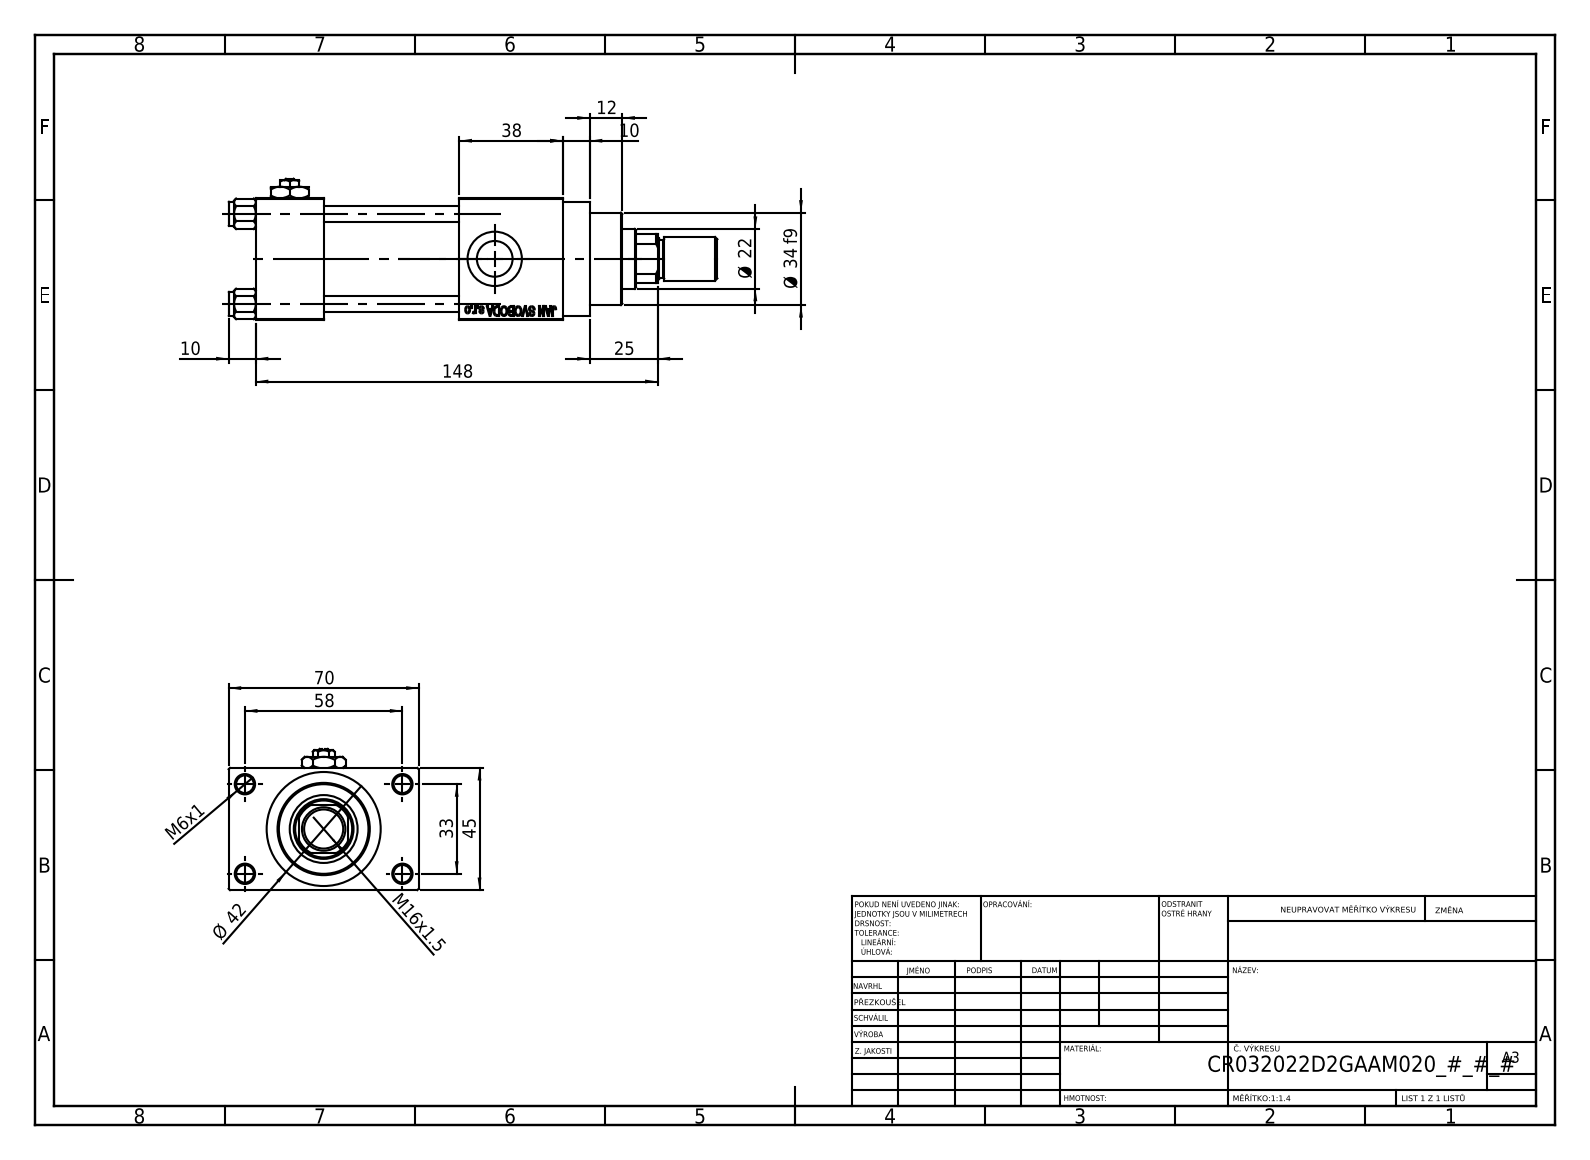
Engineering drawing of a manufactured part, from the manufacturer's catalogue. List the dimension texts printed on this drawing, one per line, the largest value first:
148
70
58
45
Ø 42
38
Ø 34 f9
33
25
Ø 22
M16x1.5
12
10
10
M6x1
